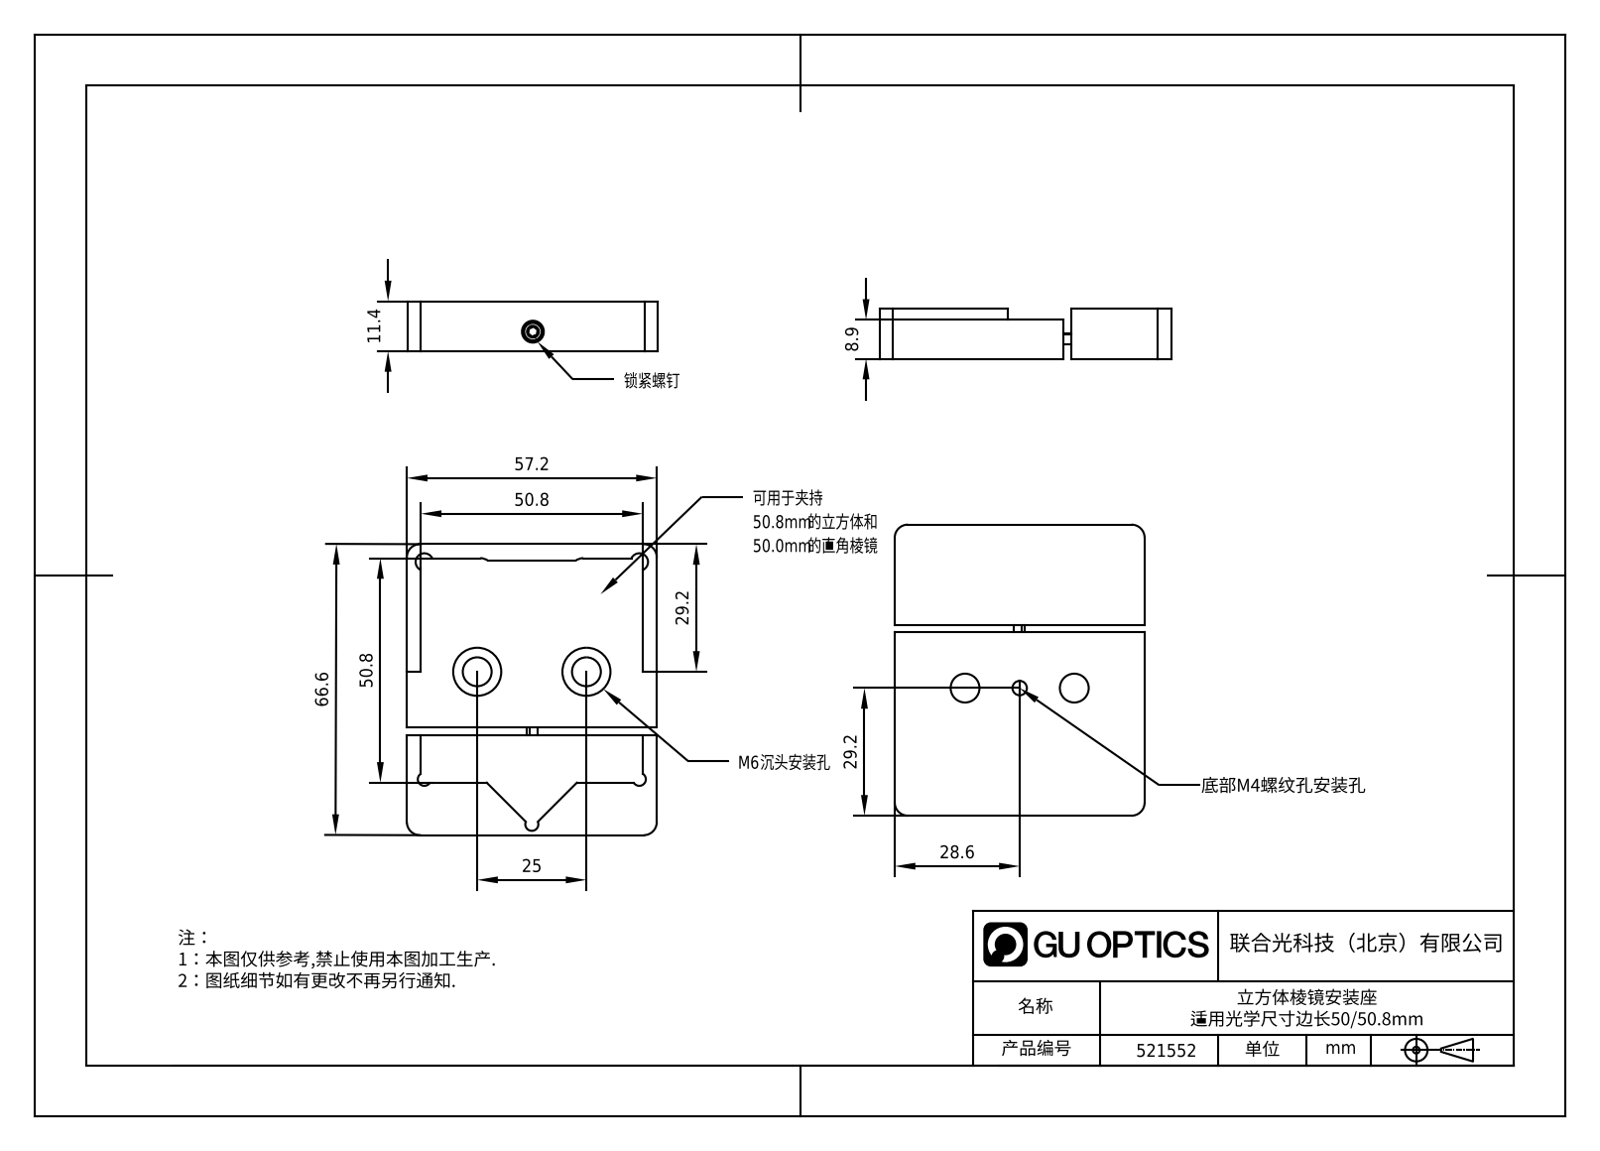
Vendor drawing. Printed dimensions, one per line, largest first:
66.6
57.2
50.8
50.8
29.2
29.2
28.6
25
11.4
8.9
